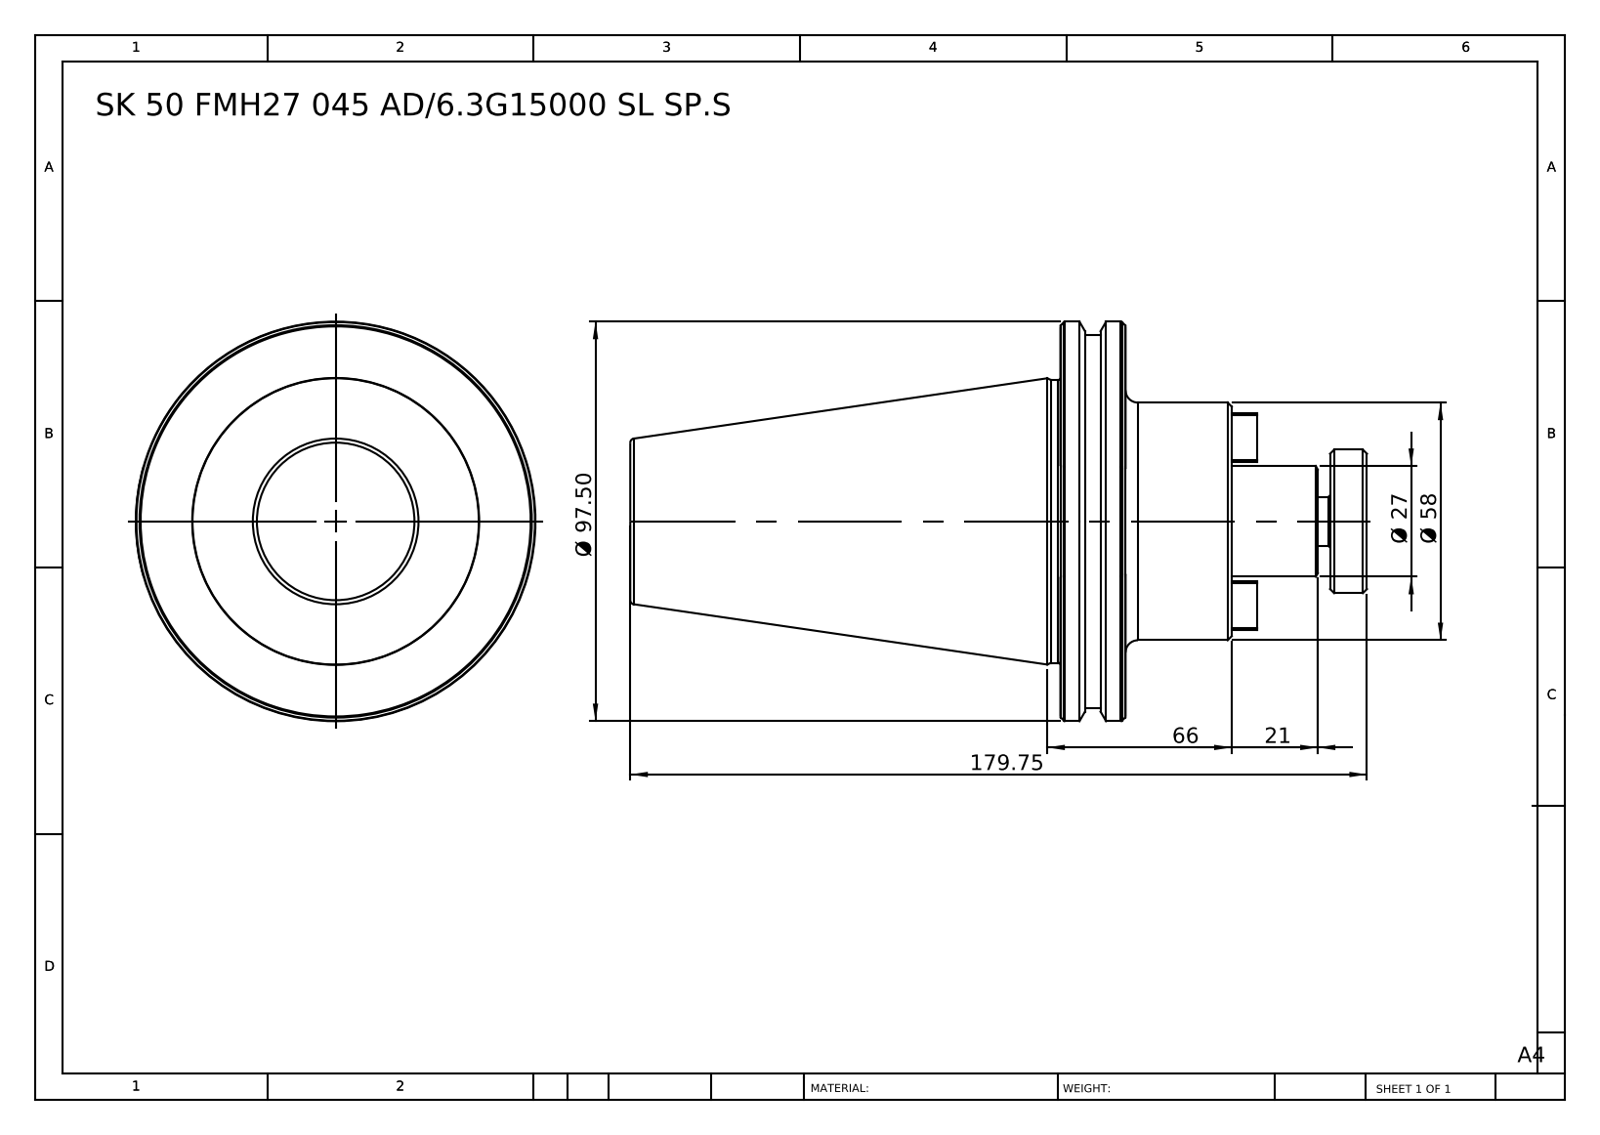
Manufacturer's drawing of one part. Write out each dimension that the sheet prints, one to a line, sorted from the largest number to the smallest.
179.75
Ø 97.50
66
Ø 58
Ø 27
21
